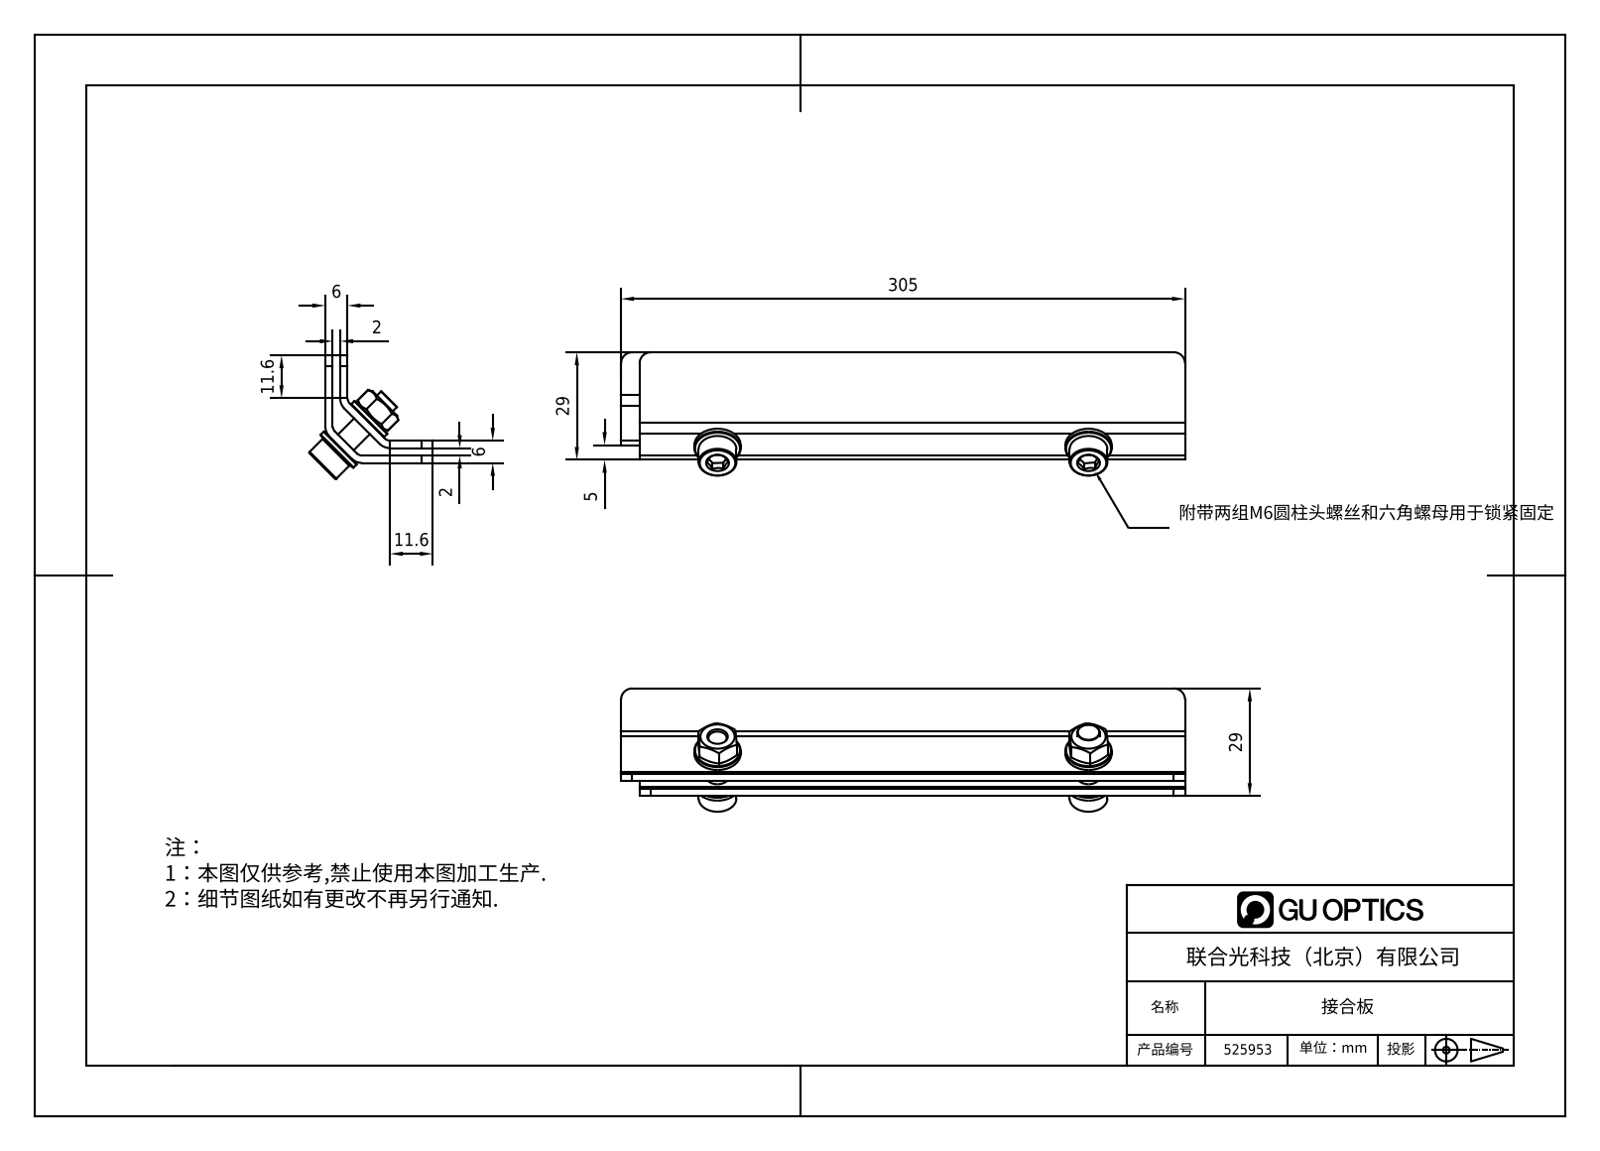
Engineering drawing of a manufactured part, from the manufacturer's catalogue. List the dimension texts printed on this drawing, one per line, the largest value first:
305
29
29
11.6
11.6
6
6
5
2
2
